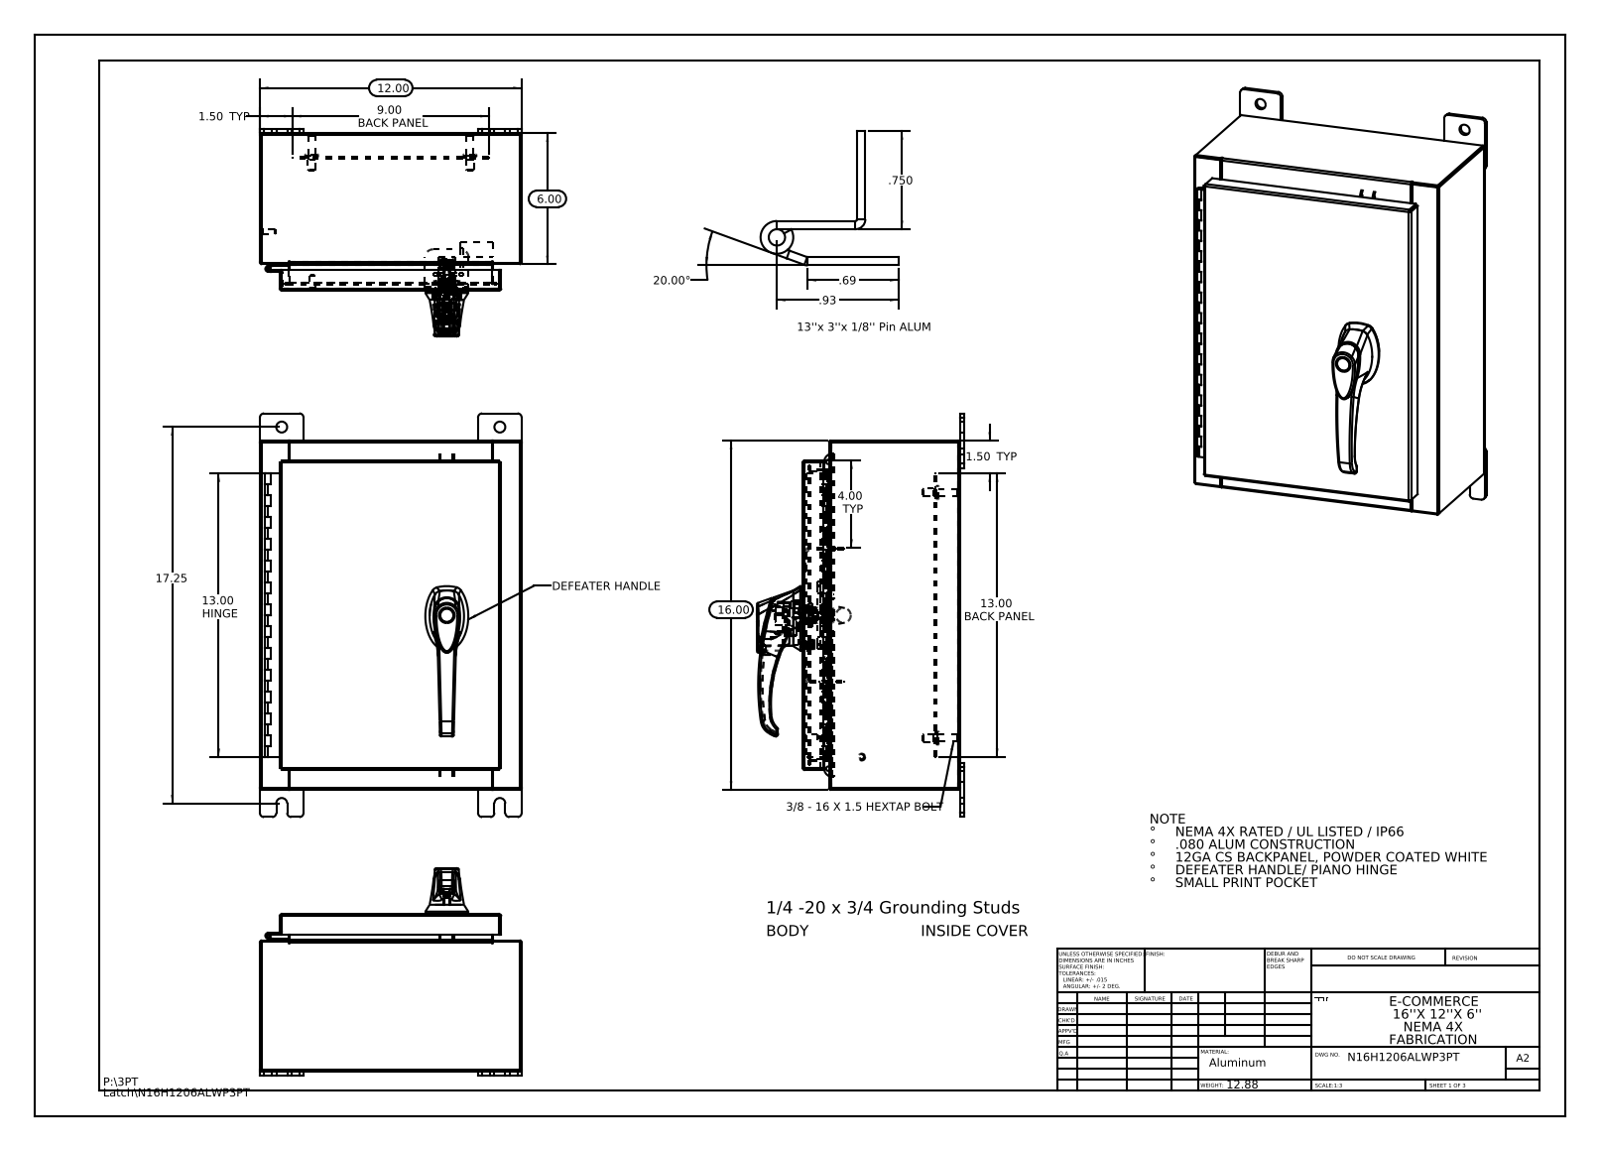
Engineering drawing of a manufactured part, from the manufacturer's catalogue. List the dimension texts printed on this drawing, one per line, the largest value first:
20.00°
17.25
16.00
13.00 HINGE
13.00 BACK PANEL
12.00
9.00 BACK PANEL
6.00
4.00 TYP
1.50 TYP
1.50 TYP
.93
.750
.69
